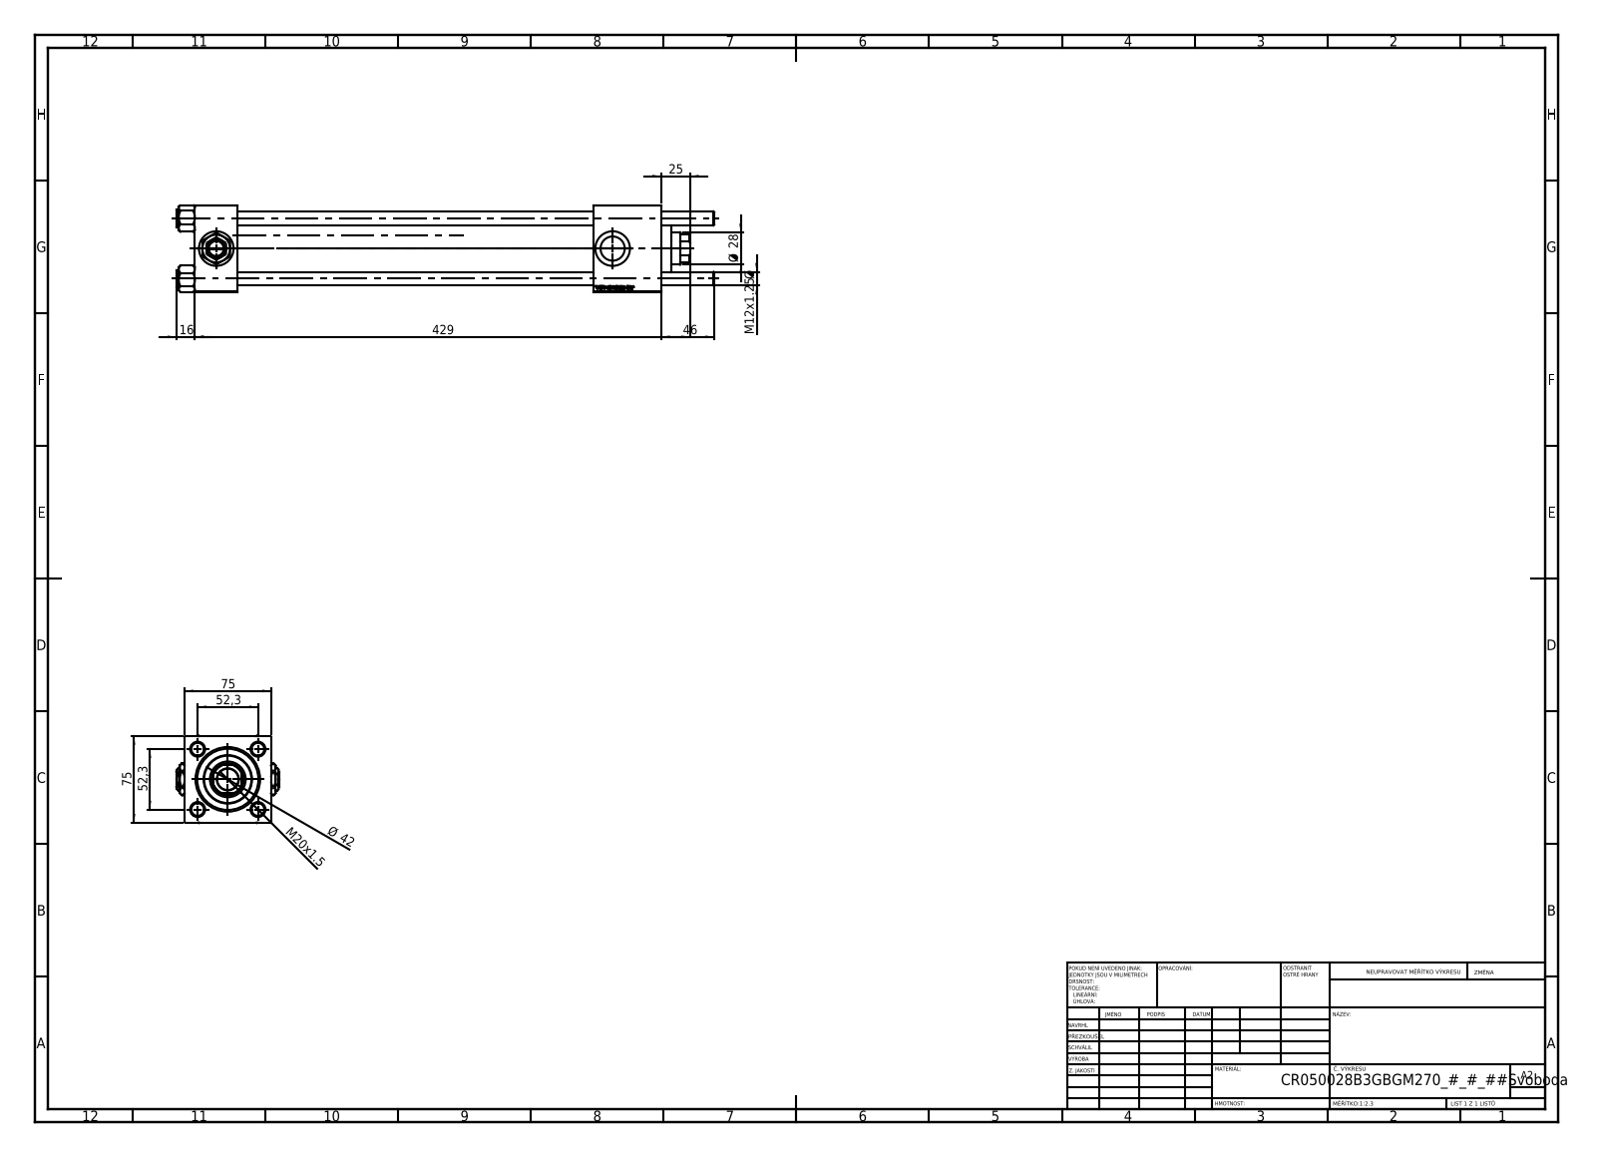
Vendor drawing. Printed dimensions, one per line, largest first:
429
75
75
52,3
52,3
46
Ø 42
Ø 28
25
M20x1.5
16
M12x1.25 Ø
